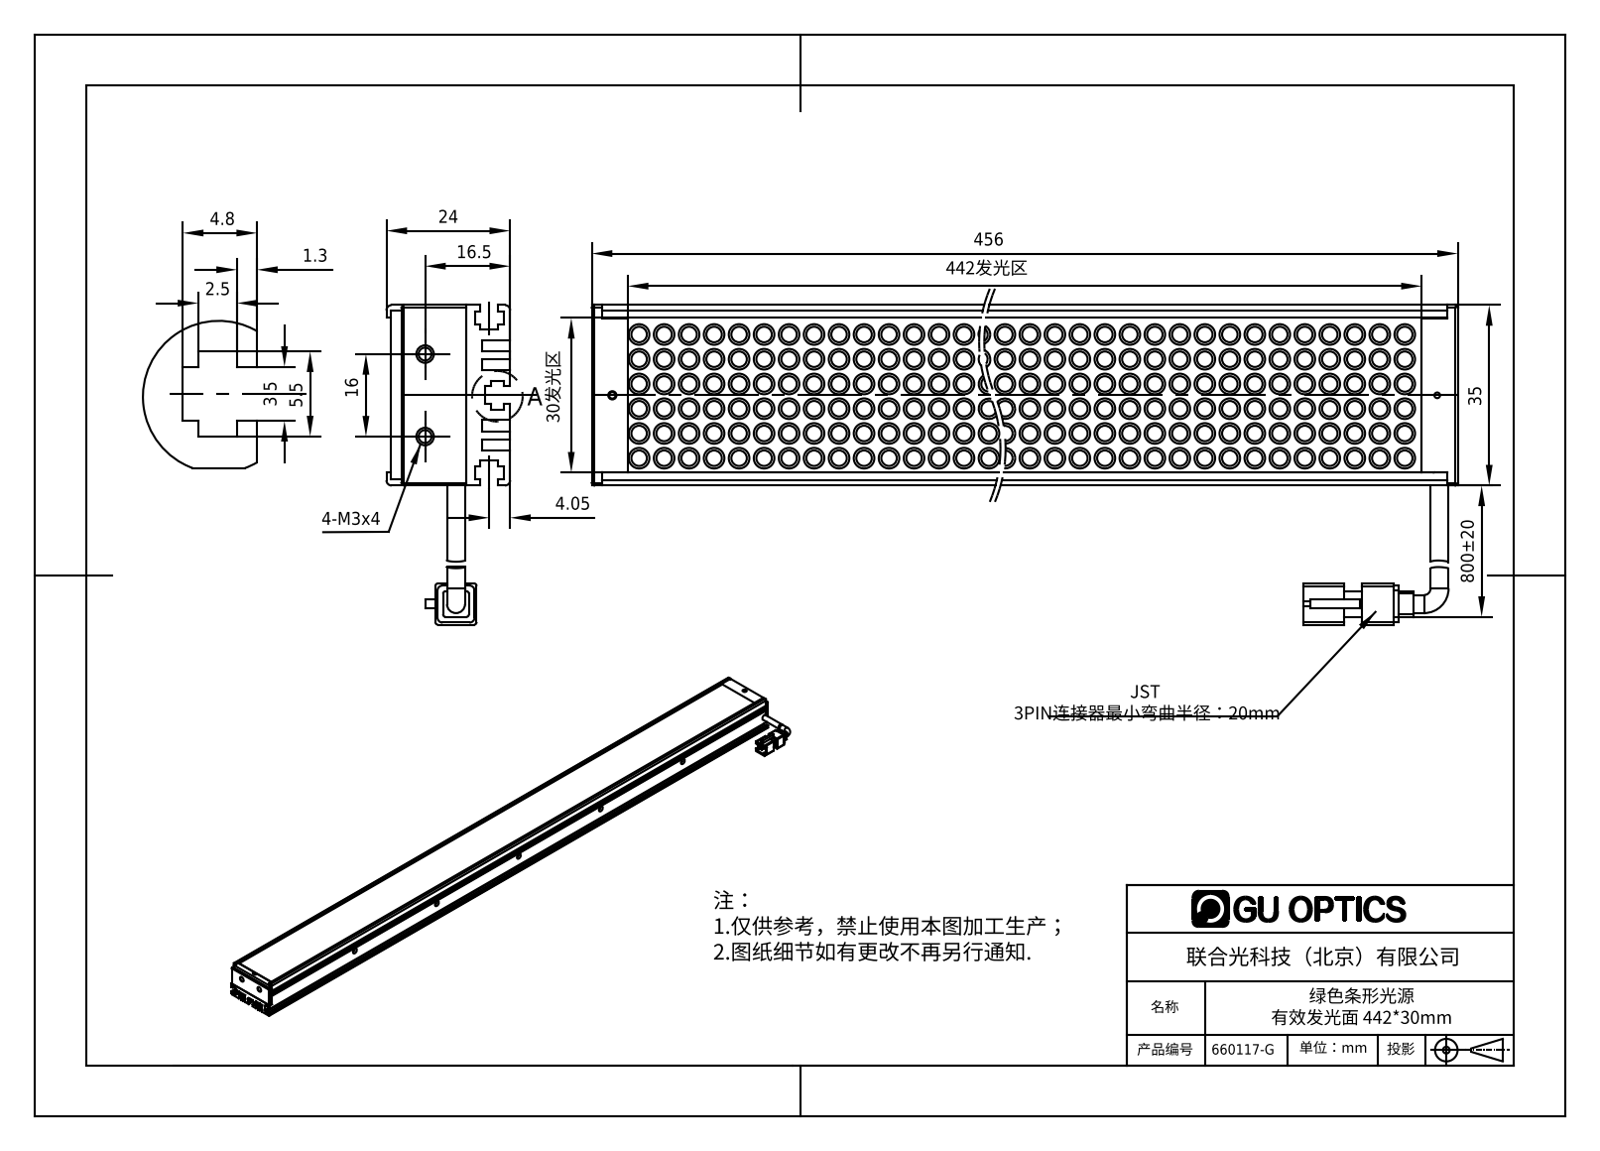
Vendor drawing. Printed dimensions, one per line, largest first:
800±20
456
442发光区
35
30发光区
24
16.5
16
5.5
4.8
4.05
3.5
2.5
1.3
